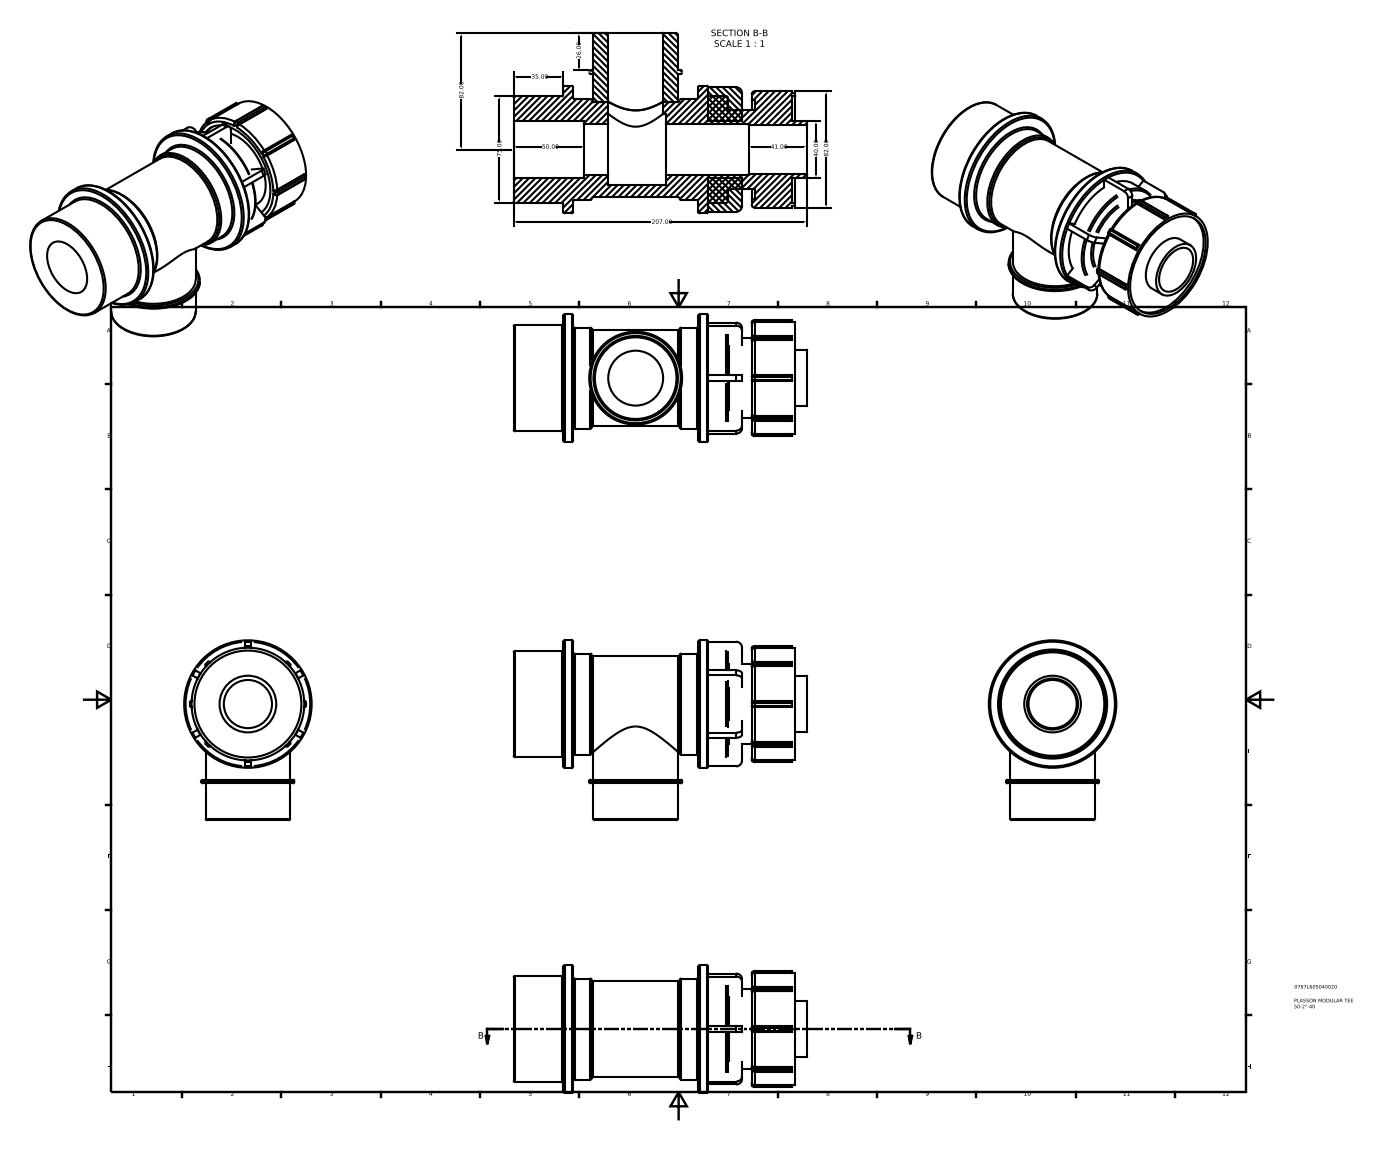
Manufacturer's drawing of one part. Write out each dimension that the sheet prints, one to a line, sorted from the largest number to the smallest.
207.00
82.00
82.00
75.00
50.00
41.00
40.00
35.00
26.00
